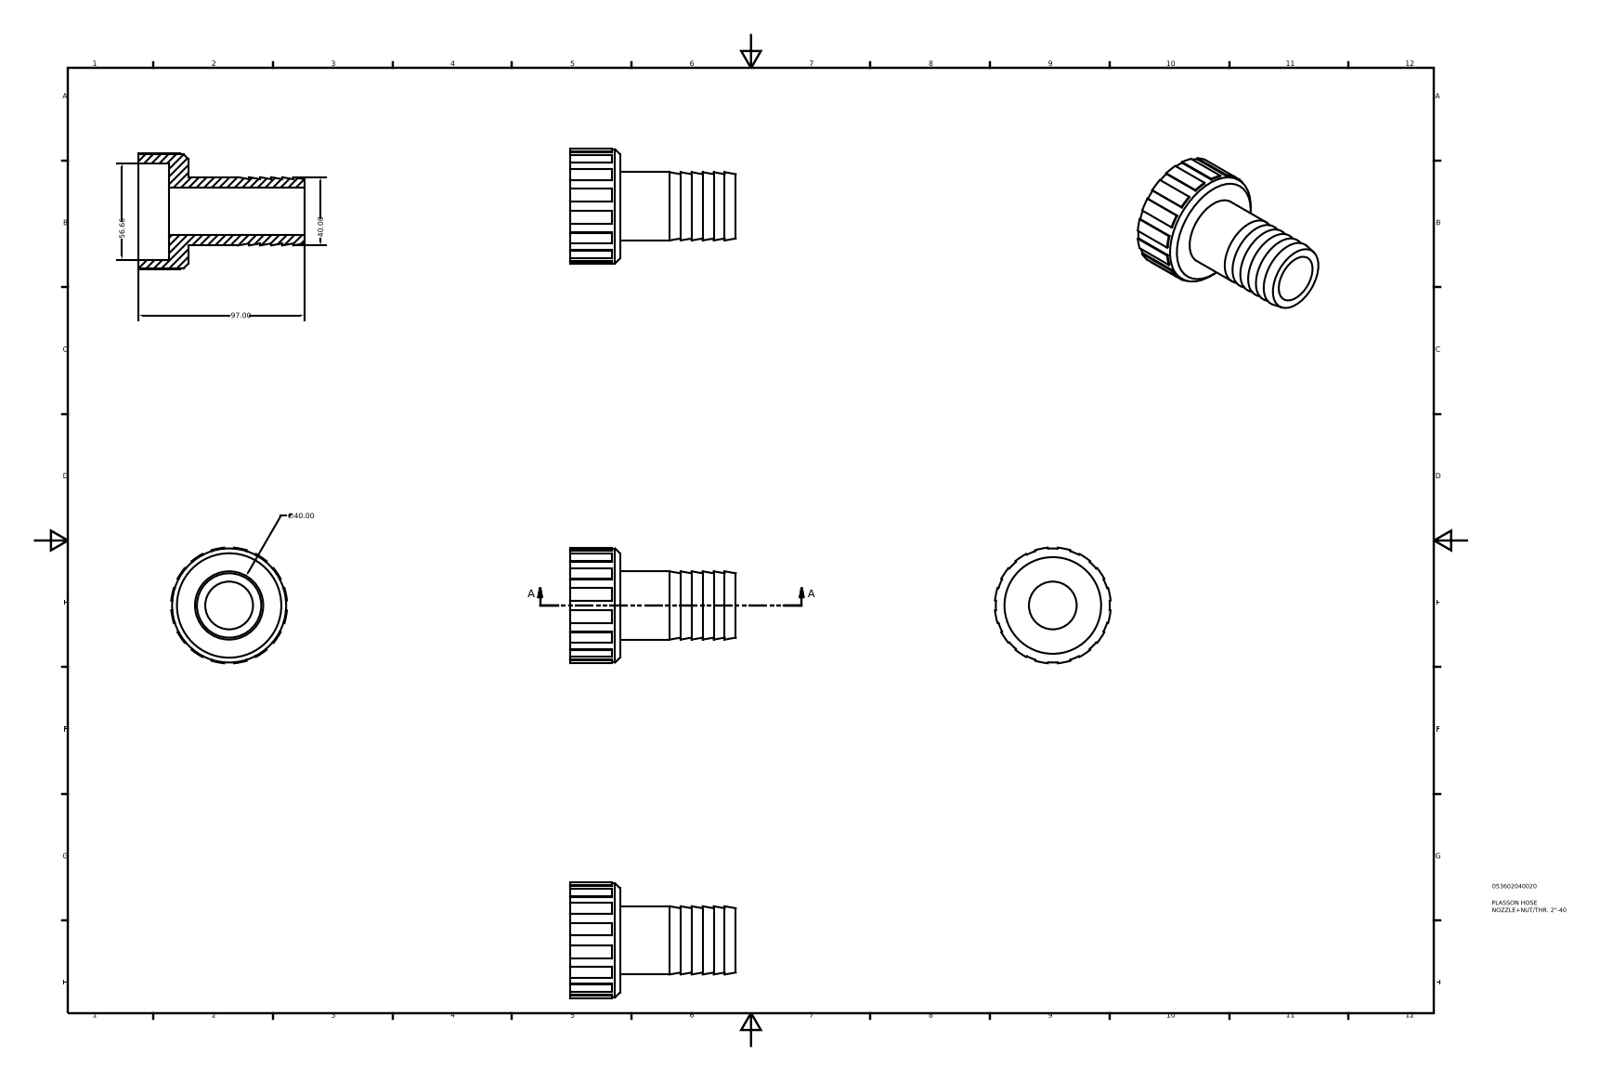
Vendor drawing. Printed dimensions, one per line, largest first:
97.00
56.66
40.00
∅40.00
